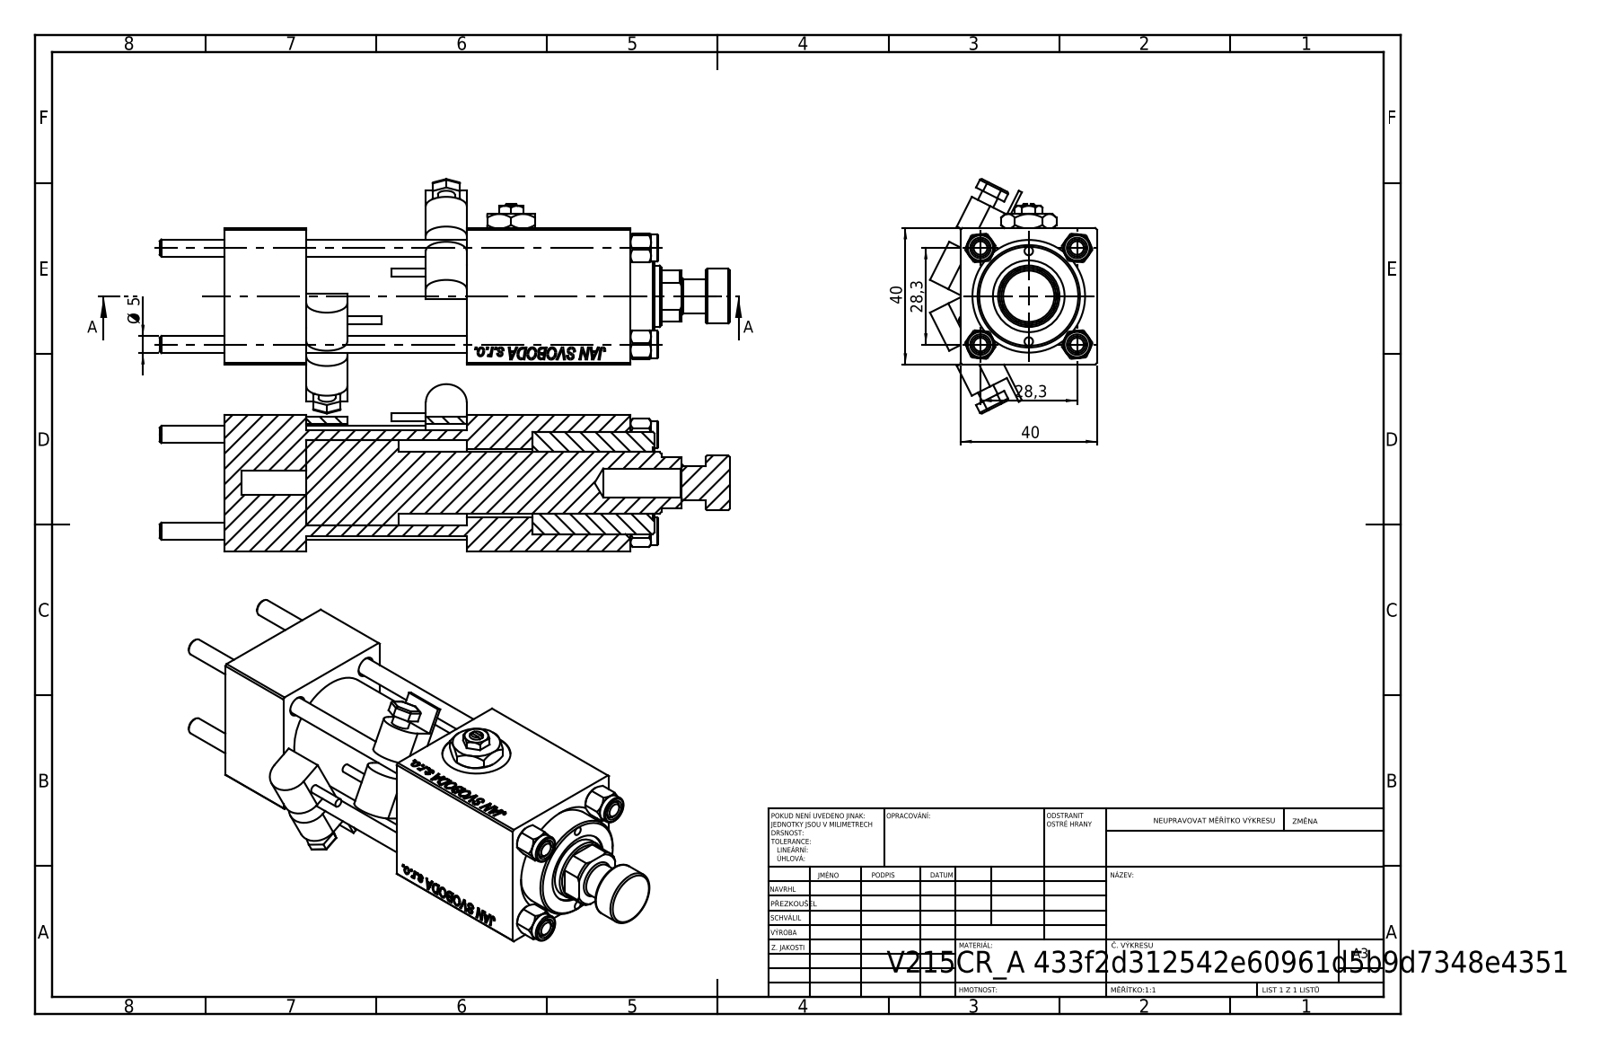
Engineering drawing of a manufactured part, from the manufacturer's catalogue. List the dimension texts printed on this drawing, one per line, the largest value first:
40
40
28,3
28,3
Ø 5
